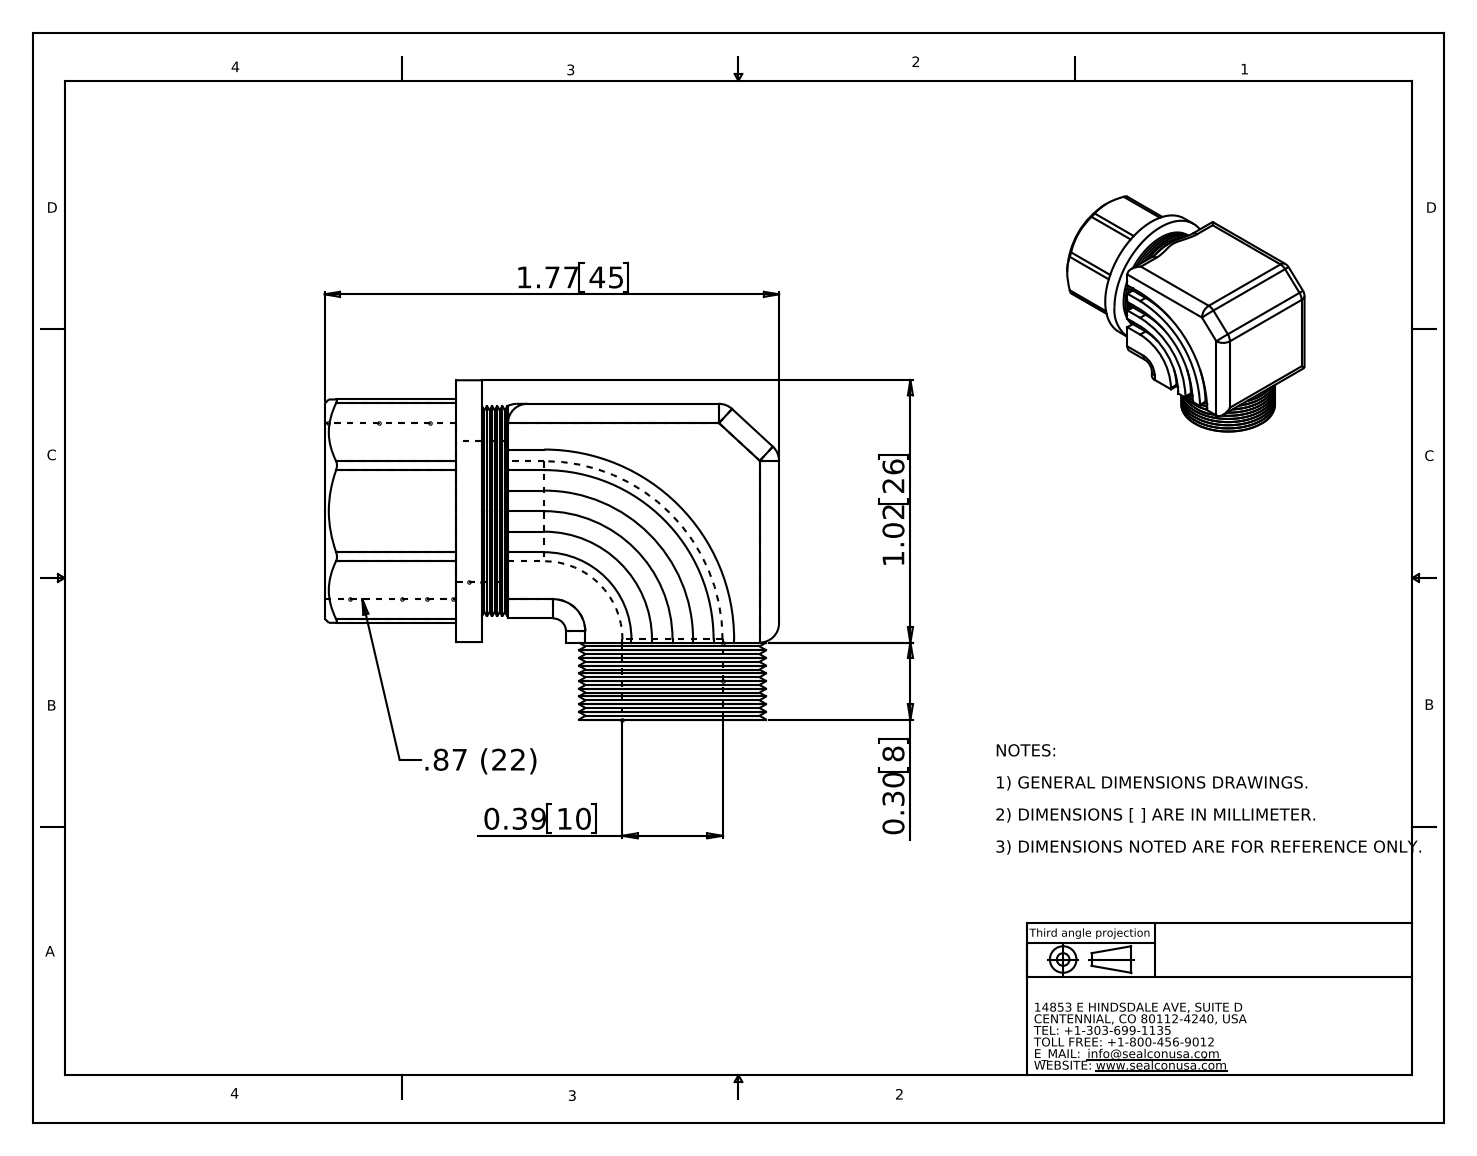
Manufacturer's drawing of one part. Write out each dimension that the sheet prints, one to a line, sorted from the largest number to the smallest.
1.77 45
1.02 26
0.39 10
0.30 8
